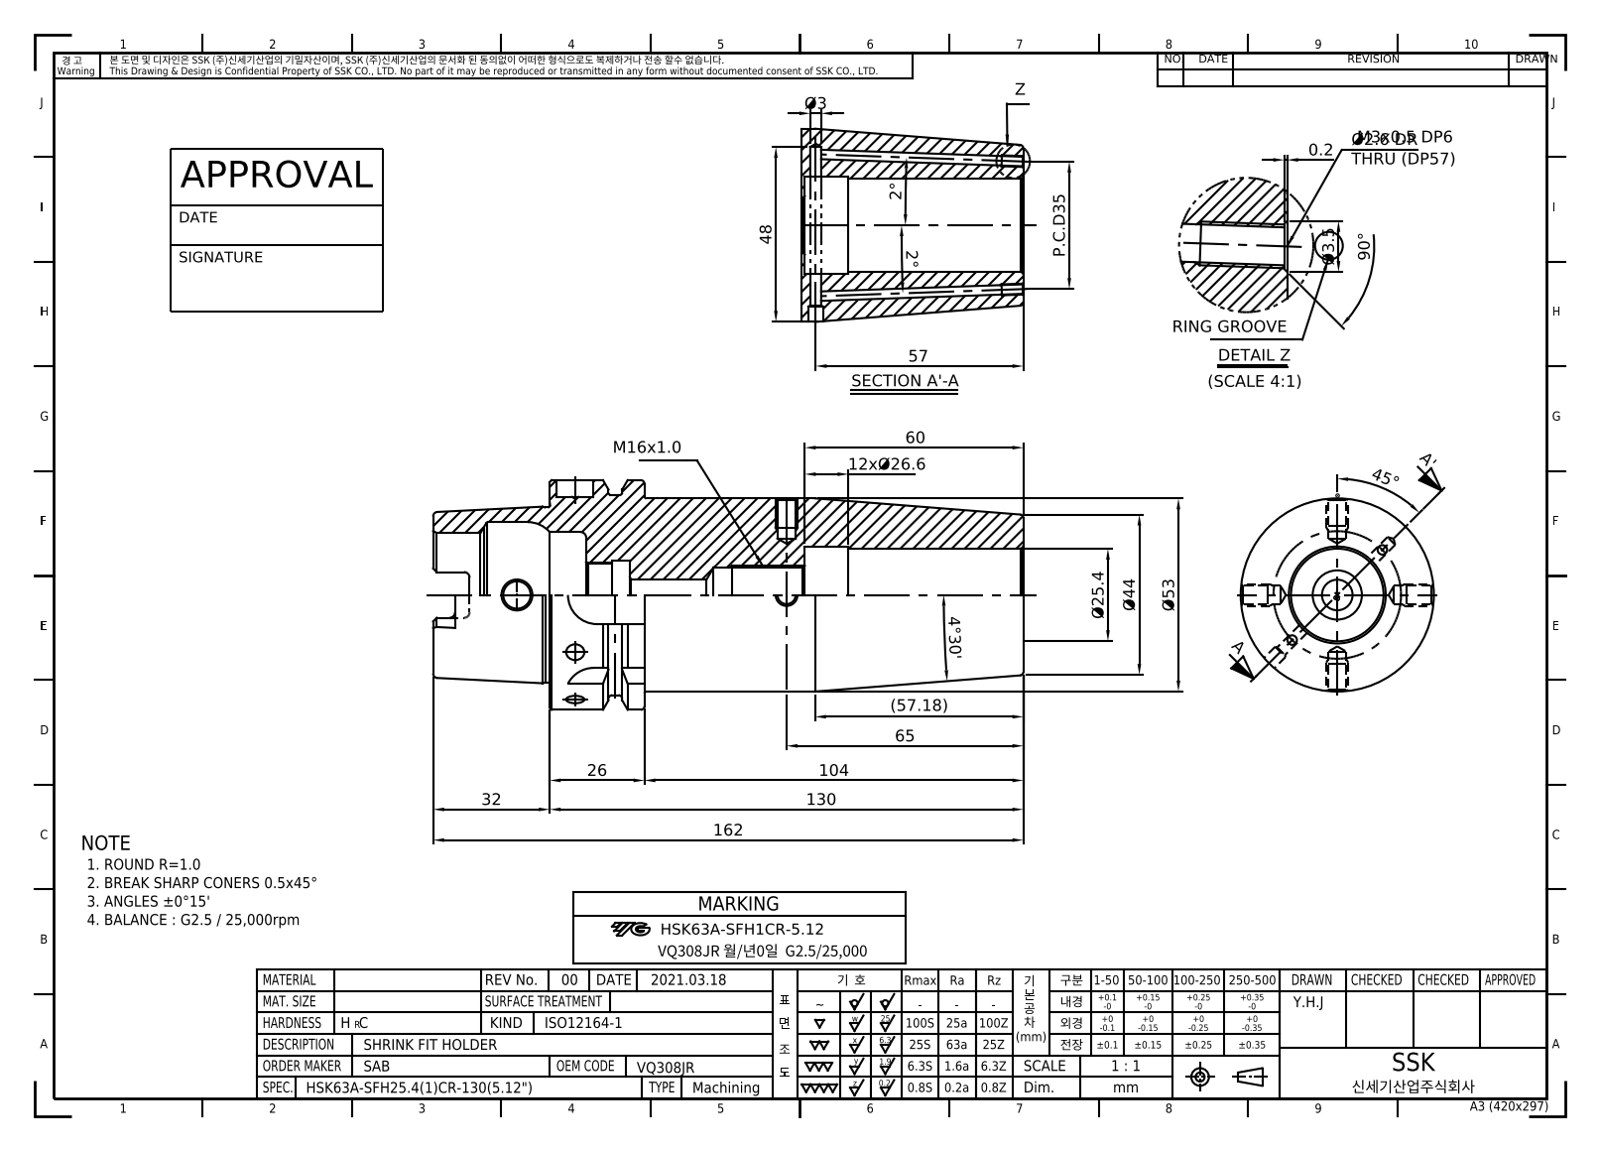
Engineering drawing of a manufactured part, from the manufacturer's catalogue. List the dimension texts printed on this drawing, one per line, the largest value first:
162
130
104
90°
65
60
(57.18)
57
Ø53
48
45°
Ø44
P.C.D35
32
12xØ26.6
26
Ø25.4
4°30'
Ø3.5
Ø3
2°
2°
0.2
